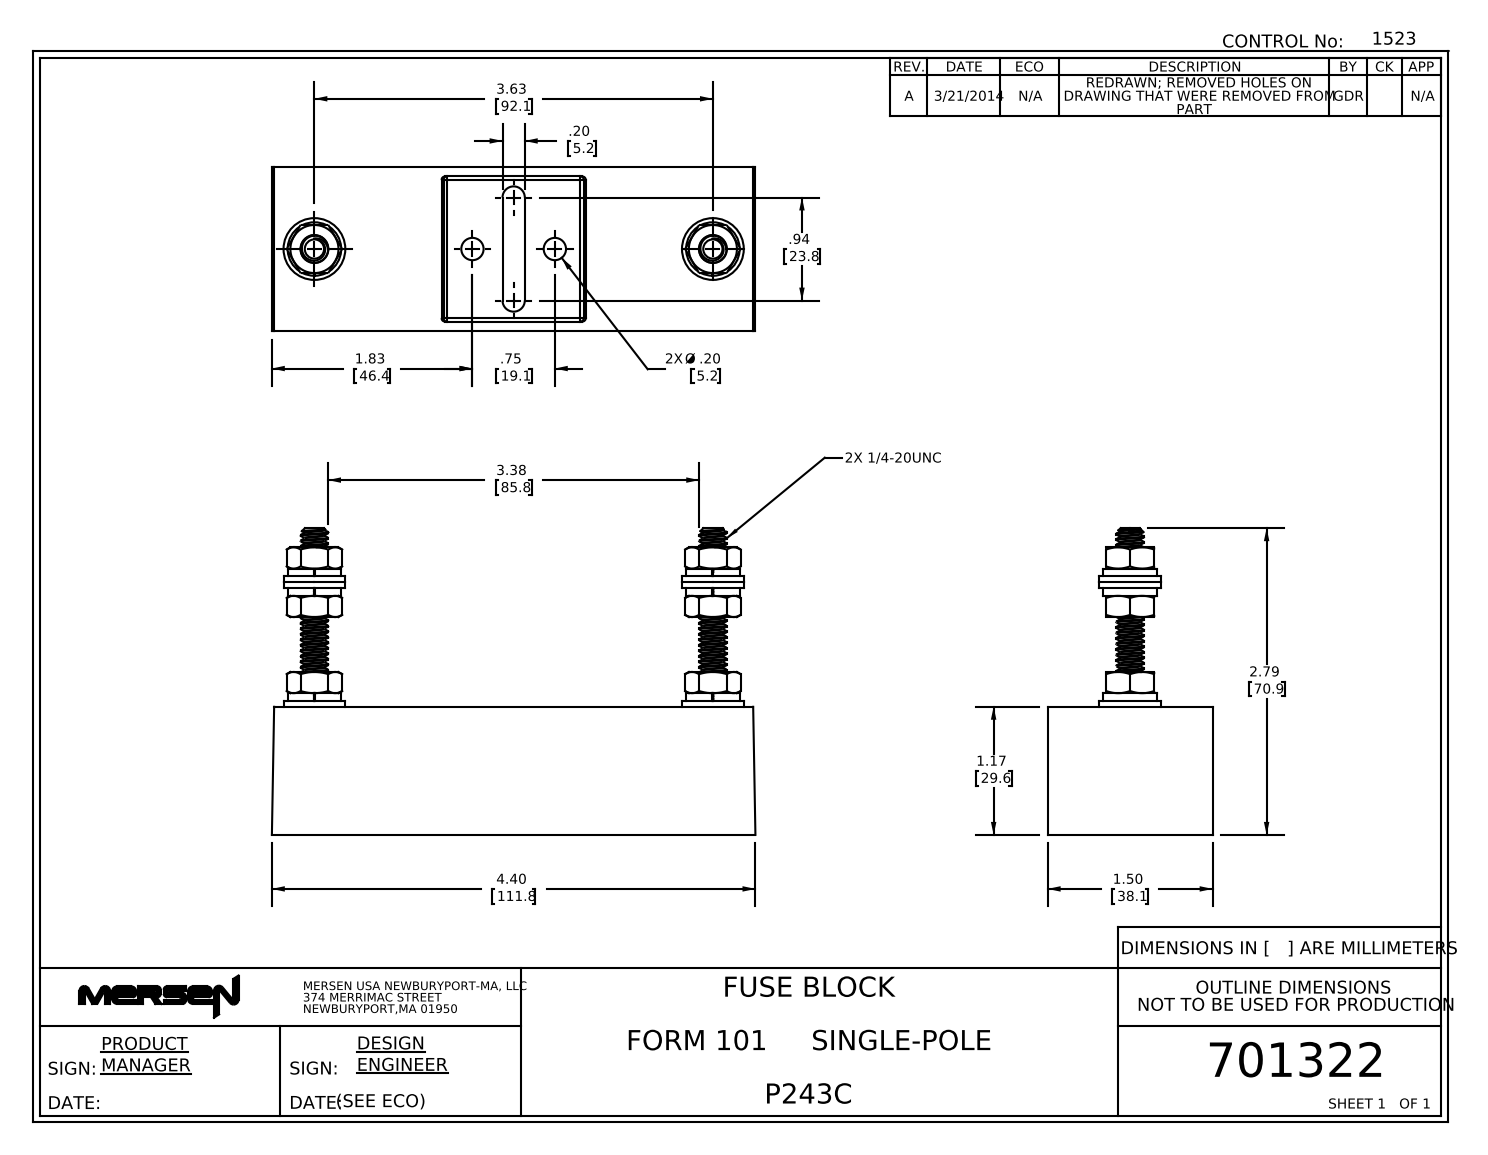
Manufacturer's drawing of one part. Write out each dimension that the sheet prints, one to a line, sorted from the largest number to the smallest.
4.40 111.8
3.63 92.1
3.38 85.8
2.79 70.9
1.83 46.4
1.50 38.1
1.17 29.6
.94 23.8
.75 19.1
.20 5.2
2X Ø .20 5.2
